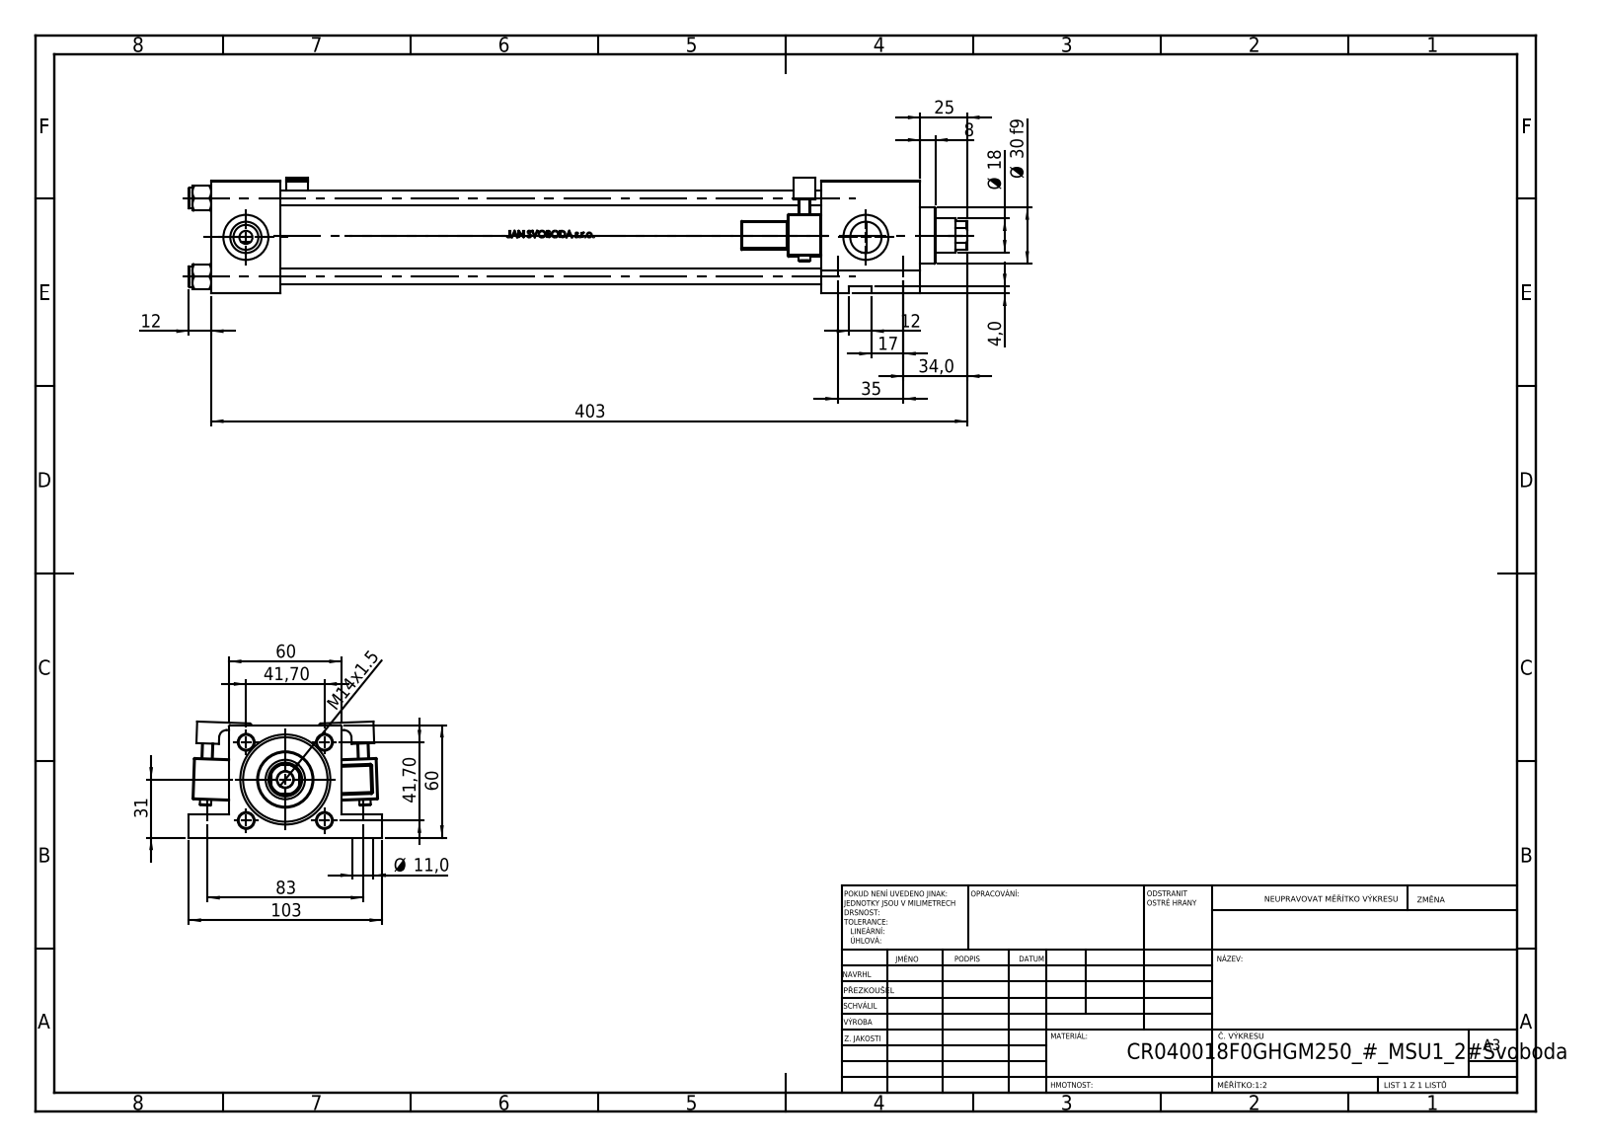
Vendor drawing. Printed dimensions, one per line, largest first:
403
103
83
60
60
41,70
41,70
35
34,0
31
Ø 30 f9
25
Ø 18
17
M14x1.5
12
12
Ø 11,0
8
4,0
